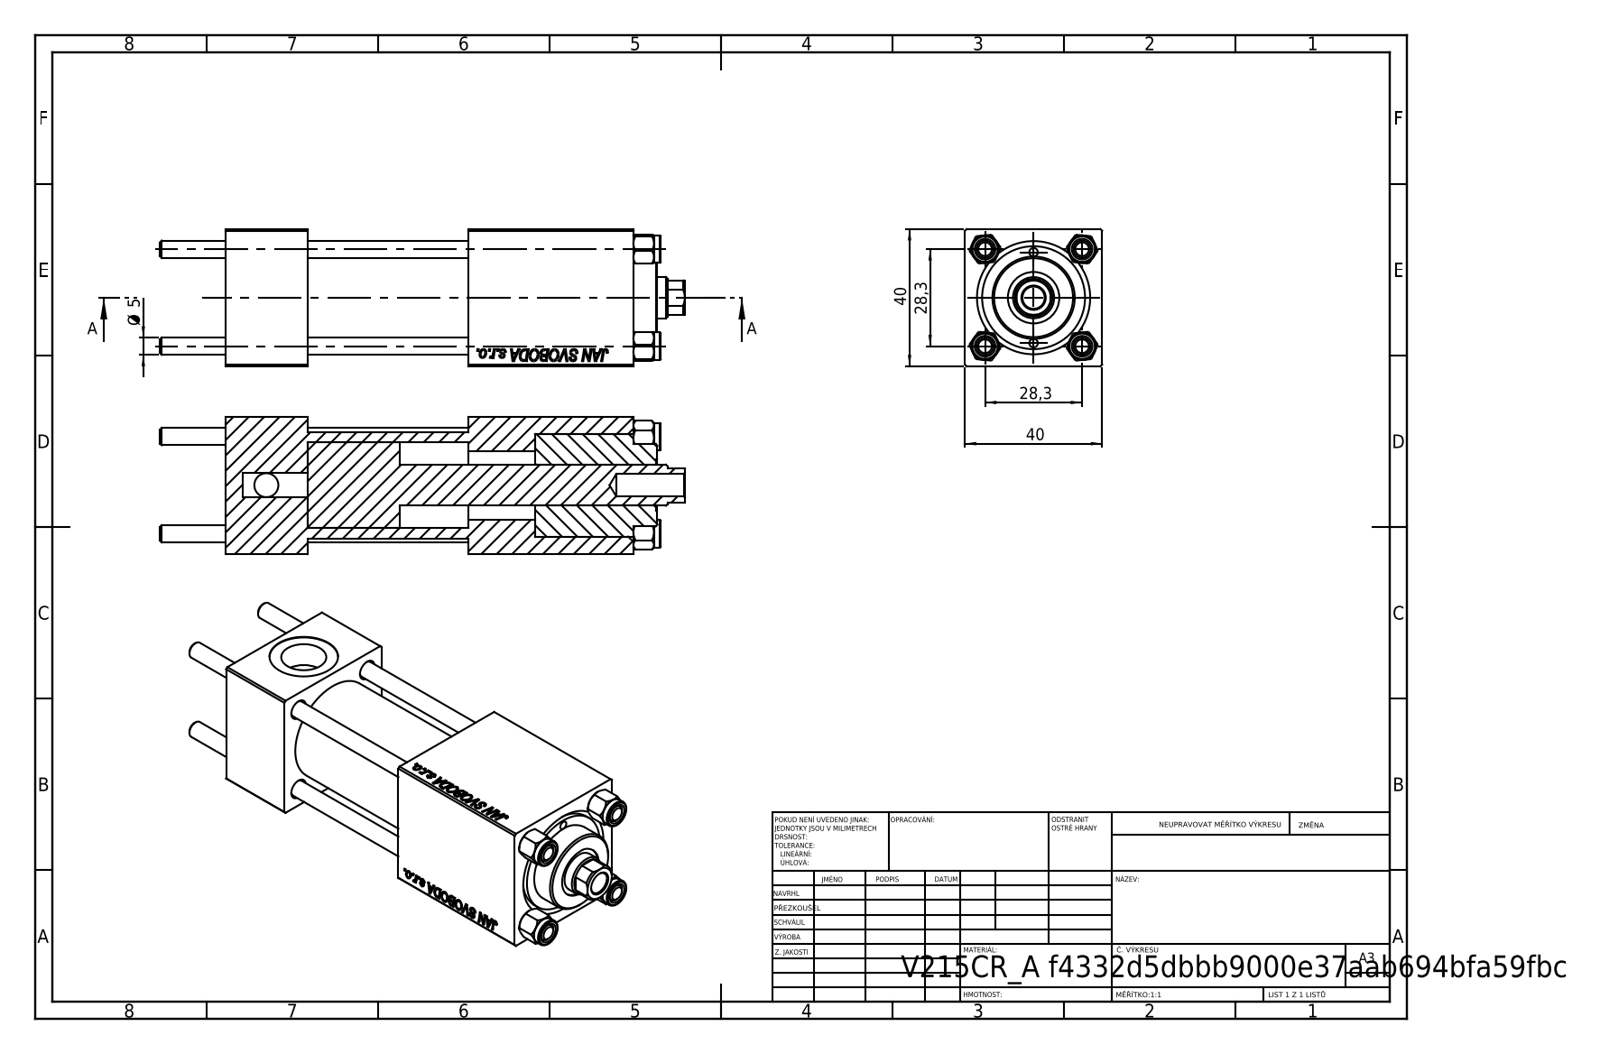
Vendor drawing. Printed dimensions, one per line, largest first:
40
40
28,3
28,3
Ø 5
